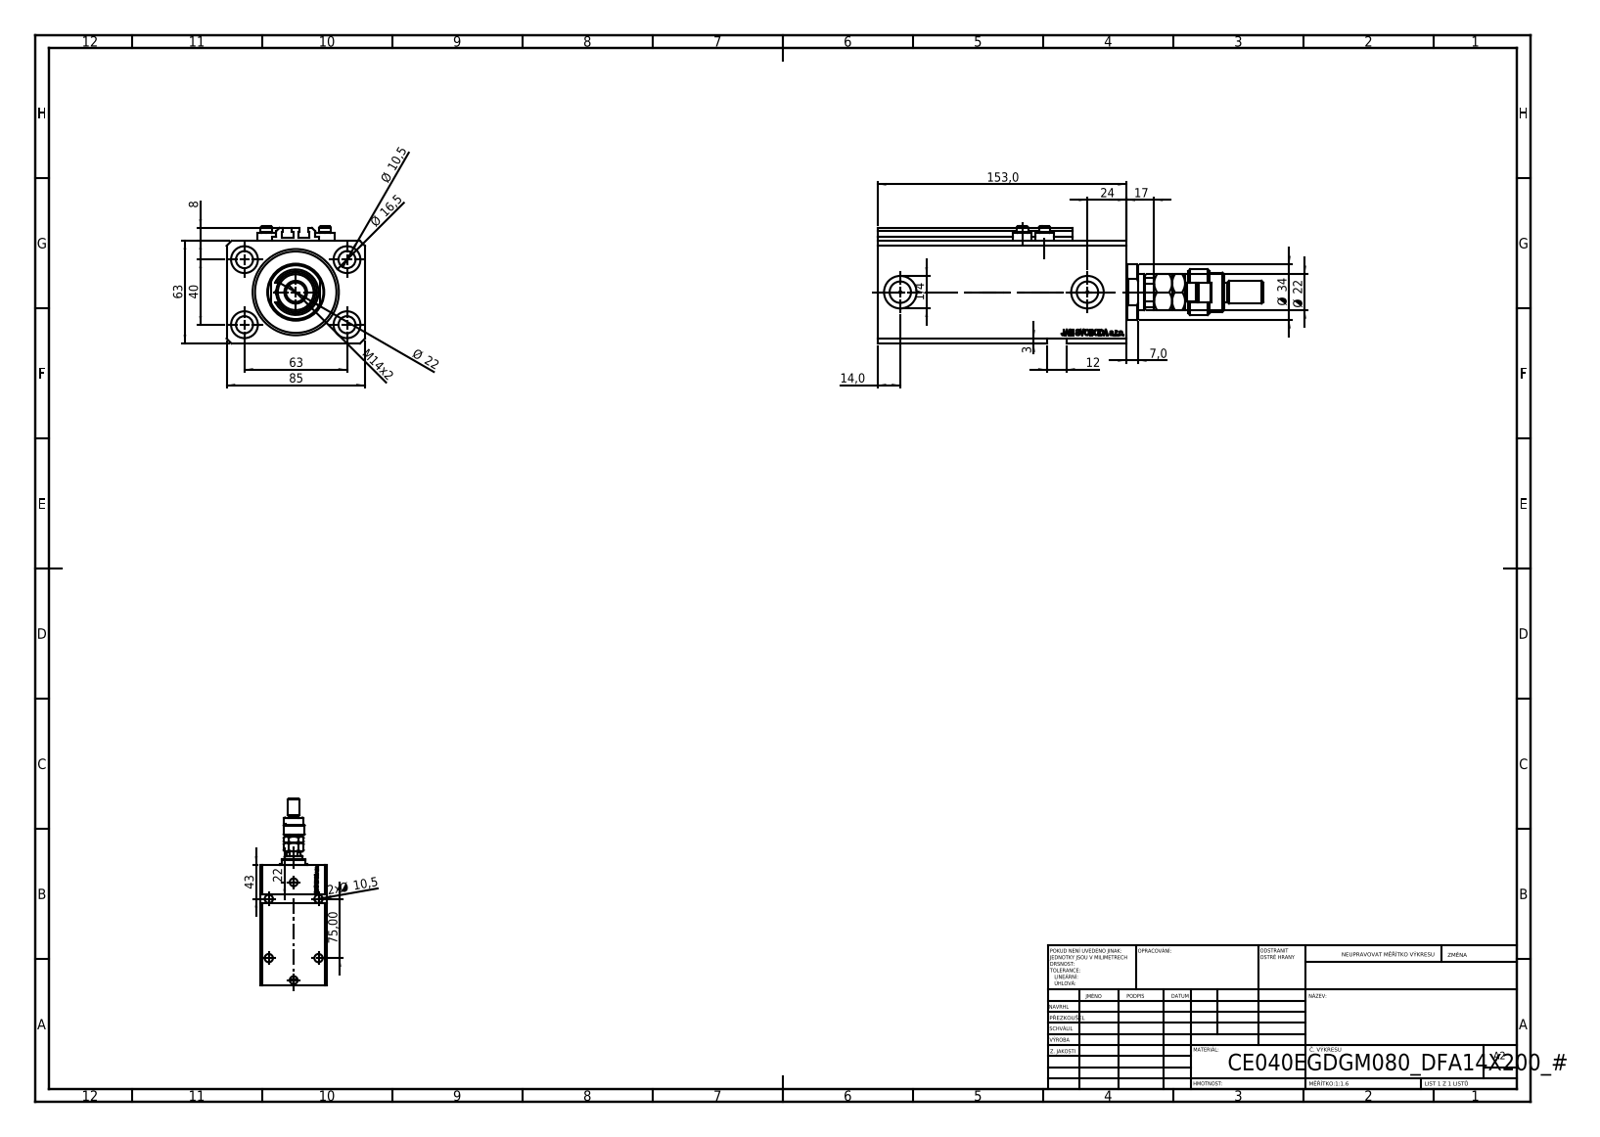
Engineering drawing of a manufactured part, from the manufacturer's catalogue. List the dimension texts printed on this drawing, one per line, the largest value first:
153,0
85
75,00
63
63
43
40
Ø 34
24
Ø 22
Ø 22
22
17
Ø 16,5
M14x2
14,0
12
Ø 10,5
2x Ø 10,5
8
7,0
3
1/4
